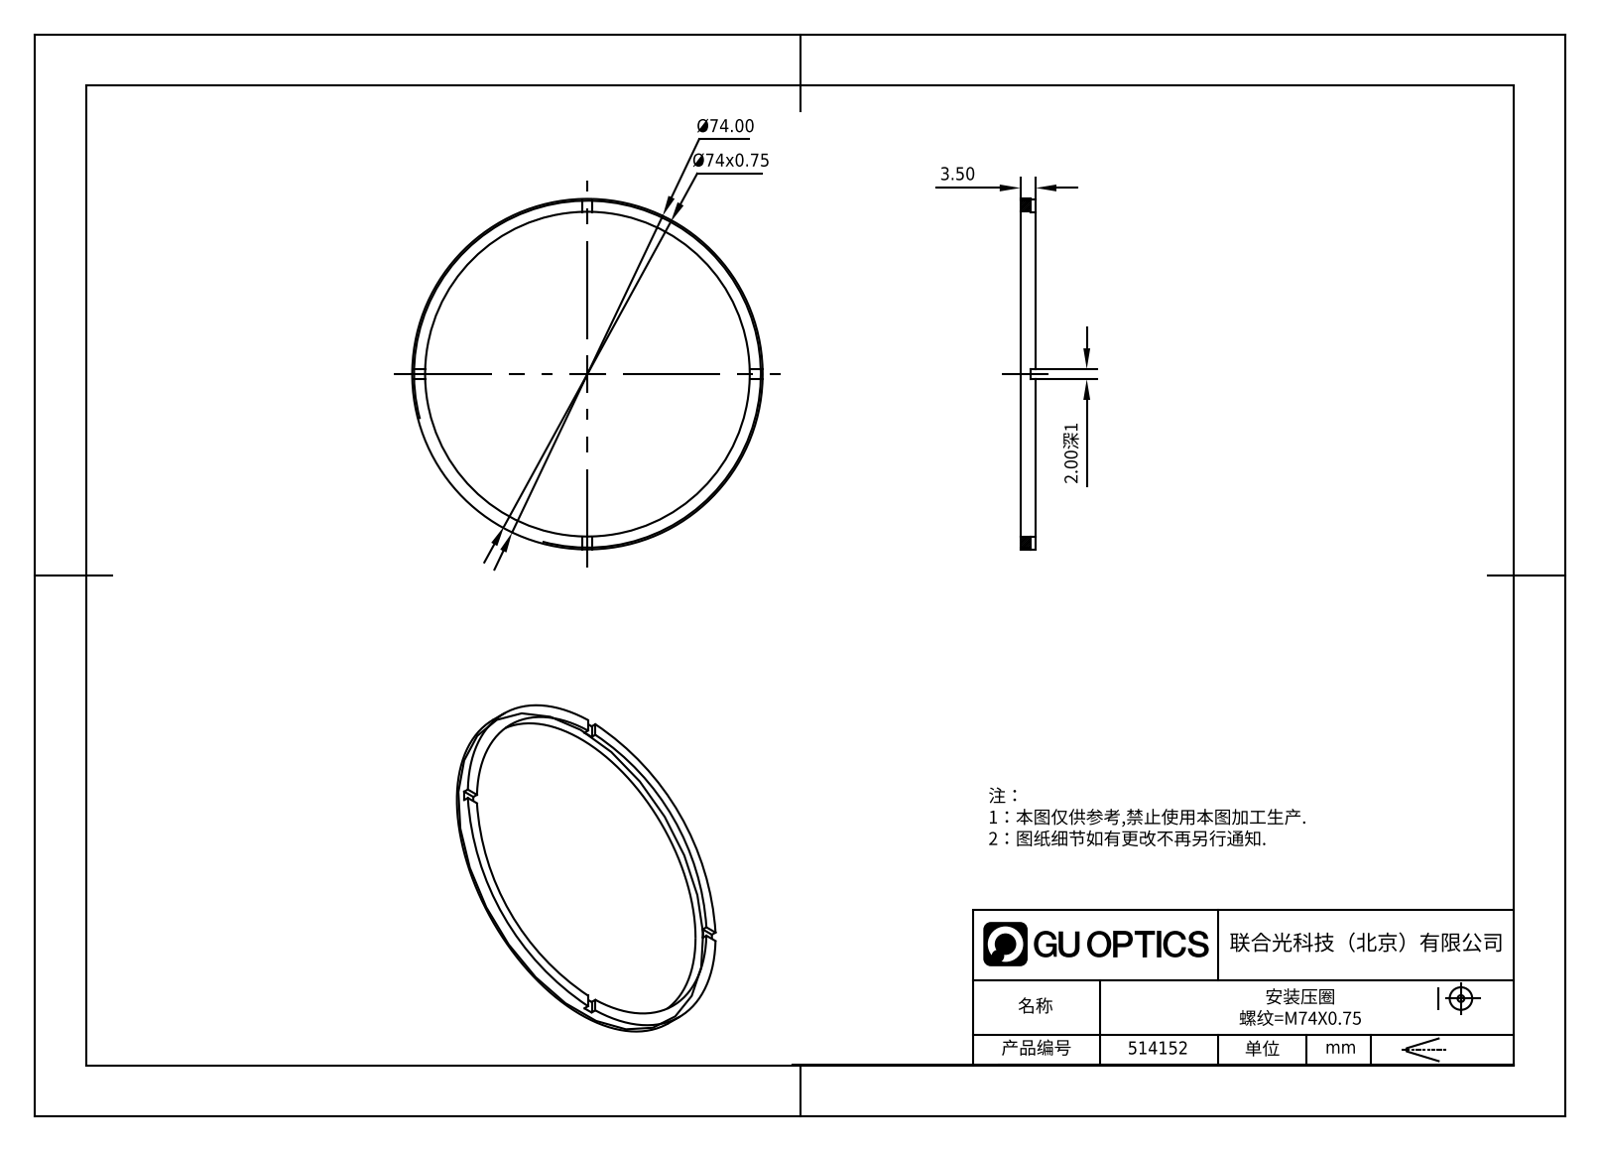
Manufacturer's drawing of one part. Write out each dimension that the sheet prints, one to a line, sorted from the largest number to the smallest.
Ø74.00
Ø74x0.75
3.50
2.00深1
